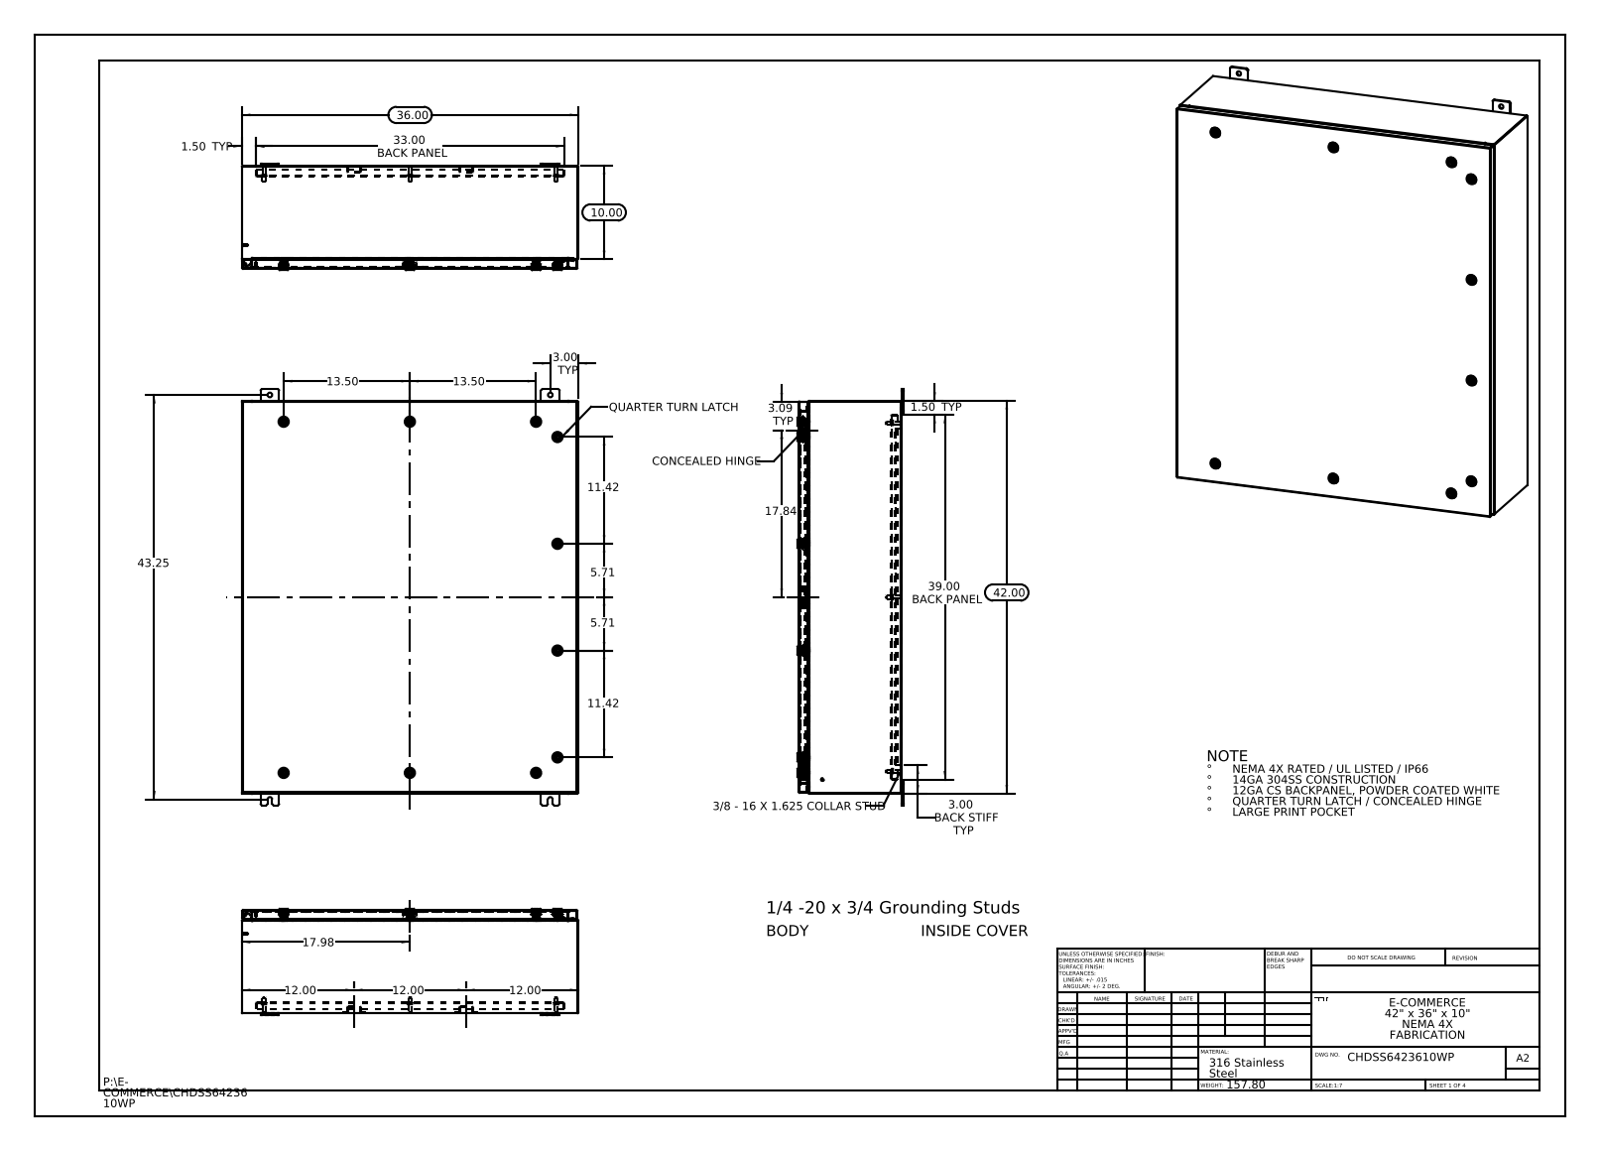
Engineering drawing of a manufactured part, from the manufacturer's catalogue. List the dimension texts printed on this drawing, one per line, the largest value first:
43.25
42.00
39.00 BACK PANEL
36.00
33.00 BACK PANEL
17.98
17.84
13.50
13.50
12.00
12.00
12.00
11.42
11.42
10.00
5.71
5.71
3.09 TYP
3.00 TYP
3.00 BACK STIFF TYP
1.50 TYP
1.50 TYP
